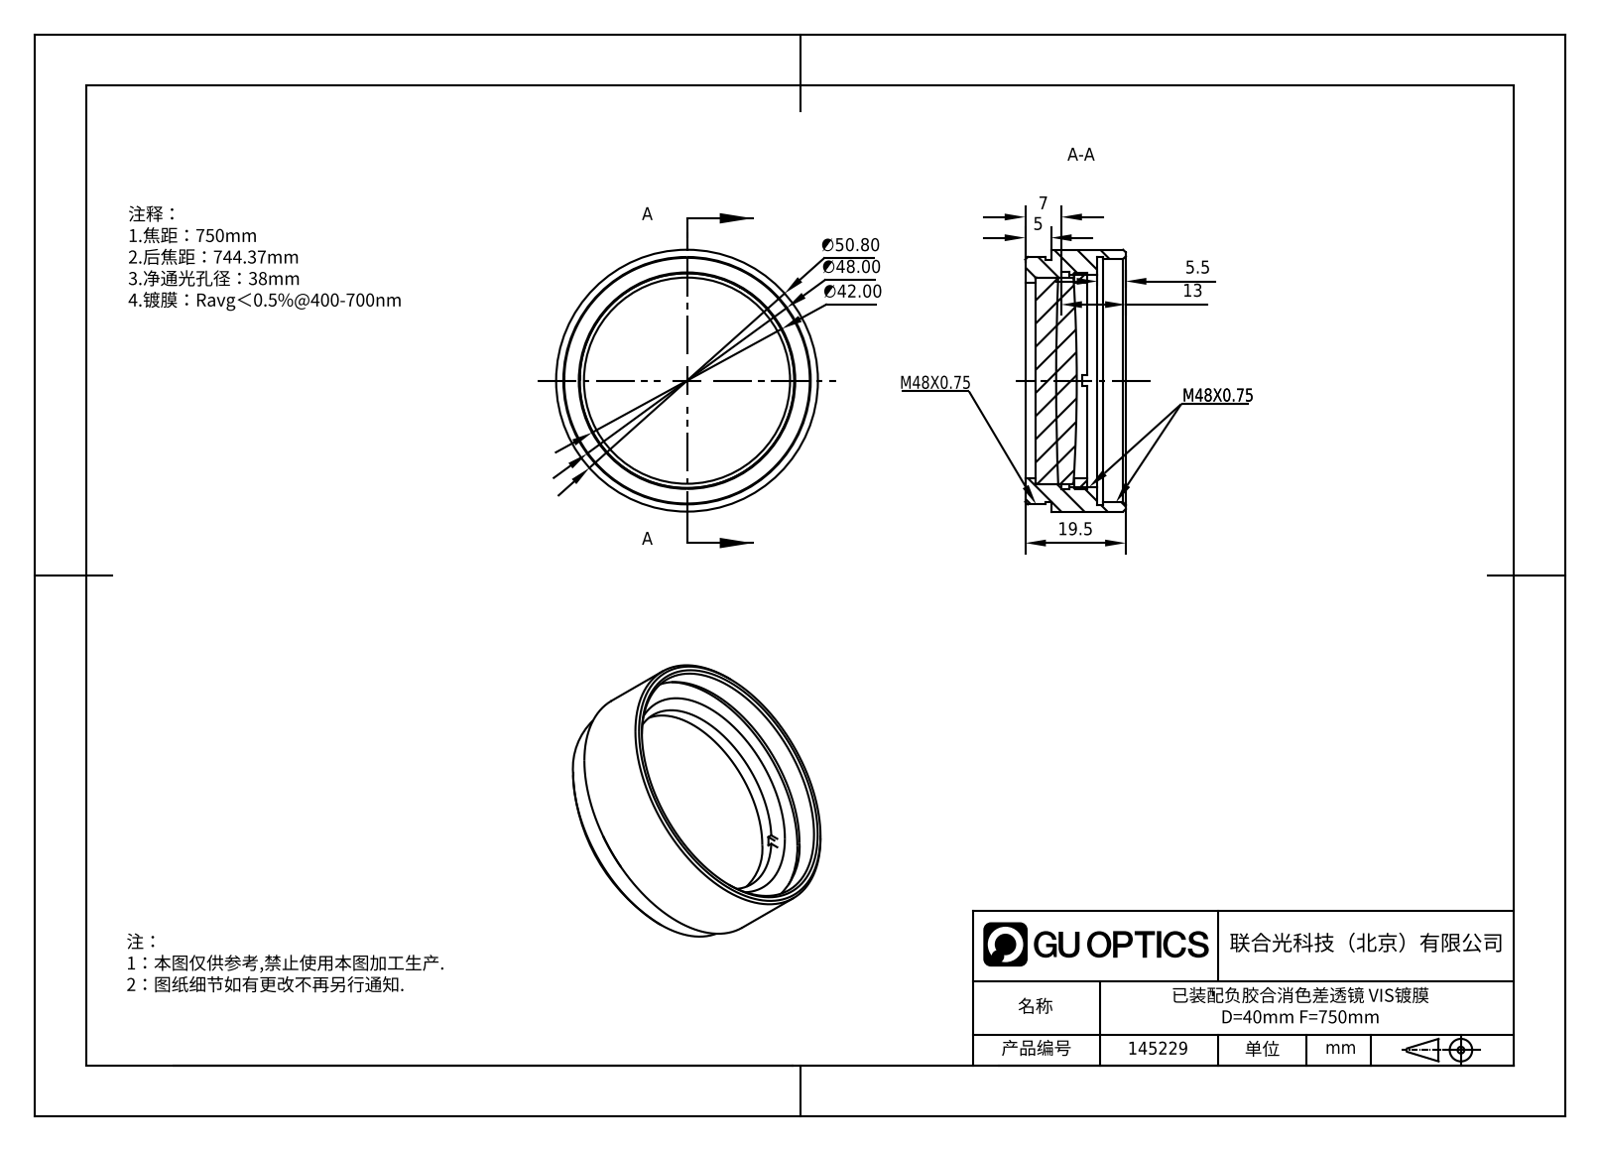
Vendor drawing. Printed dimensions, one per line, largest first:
∅50.80
∅48.00
∅42.00
19.5
13
7
5.5
5
